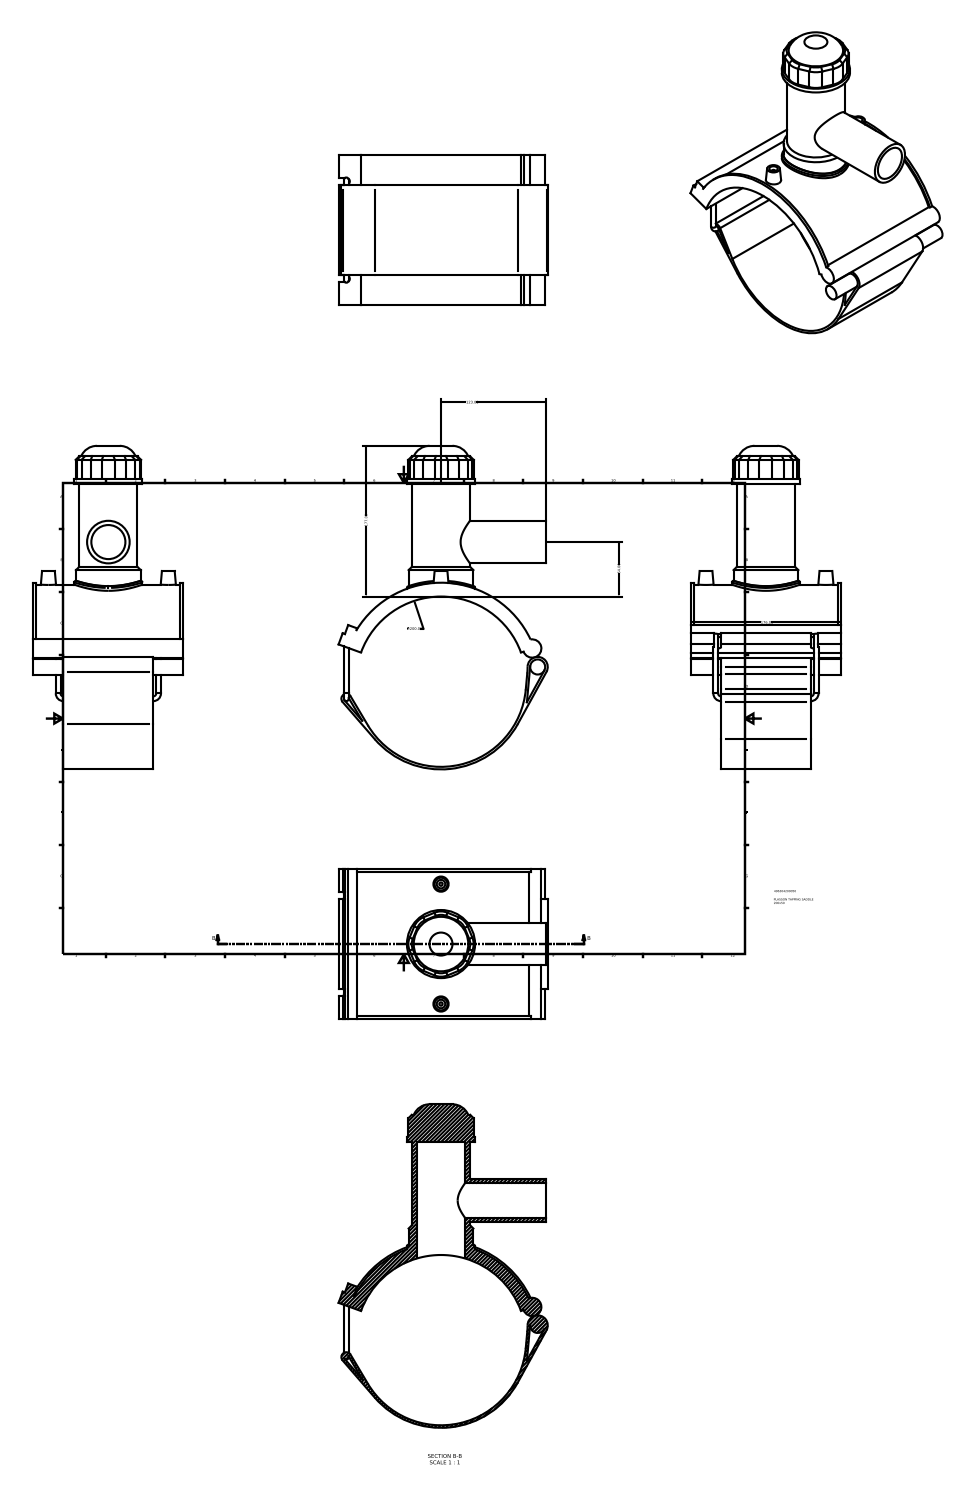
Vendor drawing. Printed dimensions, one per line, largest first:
∅200.00
177.00
176.00
123.00
64.00
